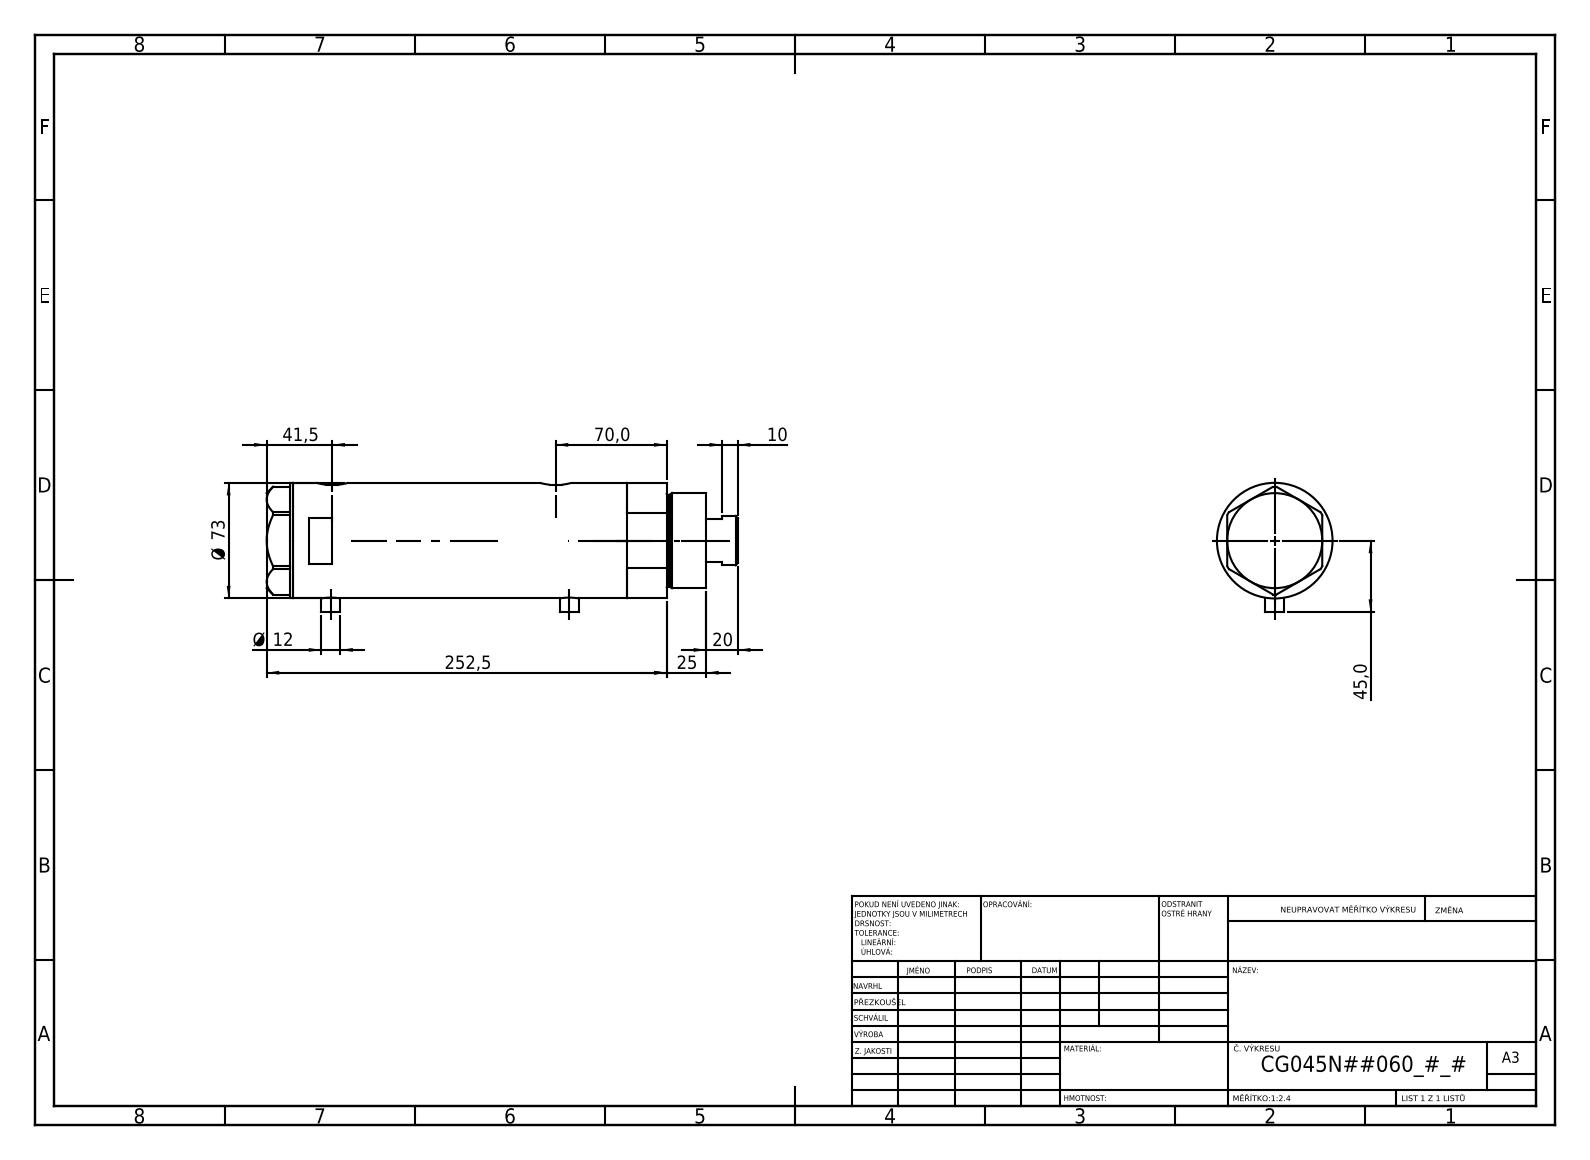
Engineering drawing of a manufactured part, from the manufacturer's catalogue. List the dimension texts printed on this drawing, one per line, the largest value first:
252,5
Ø 73
70,0
45,0
41,5
25
20
Ø 12
10
